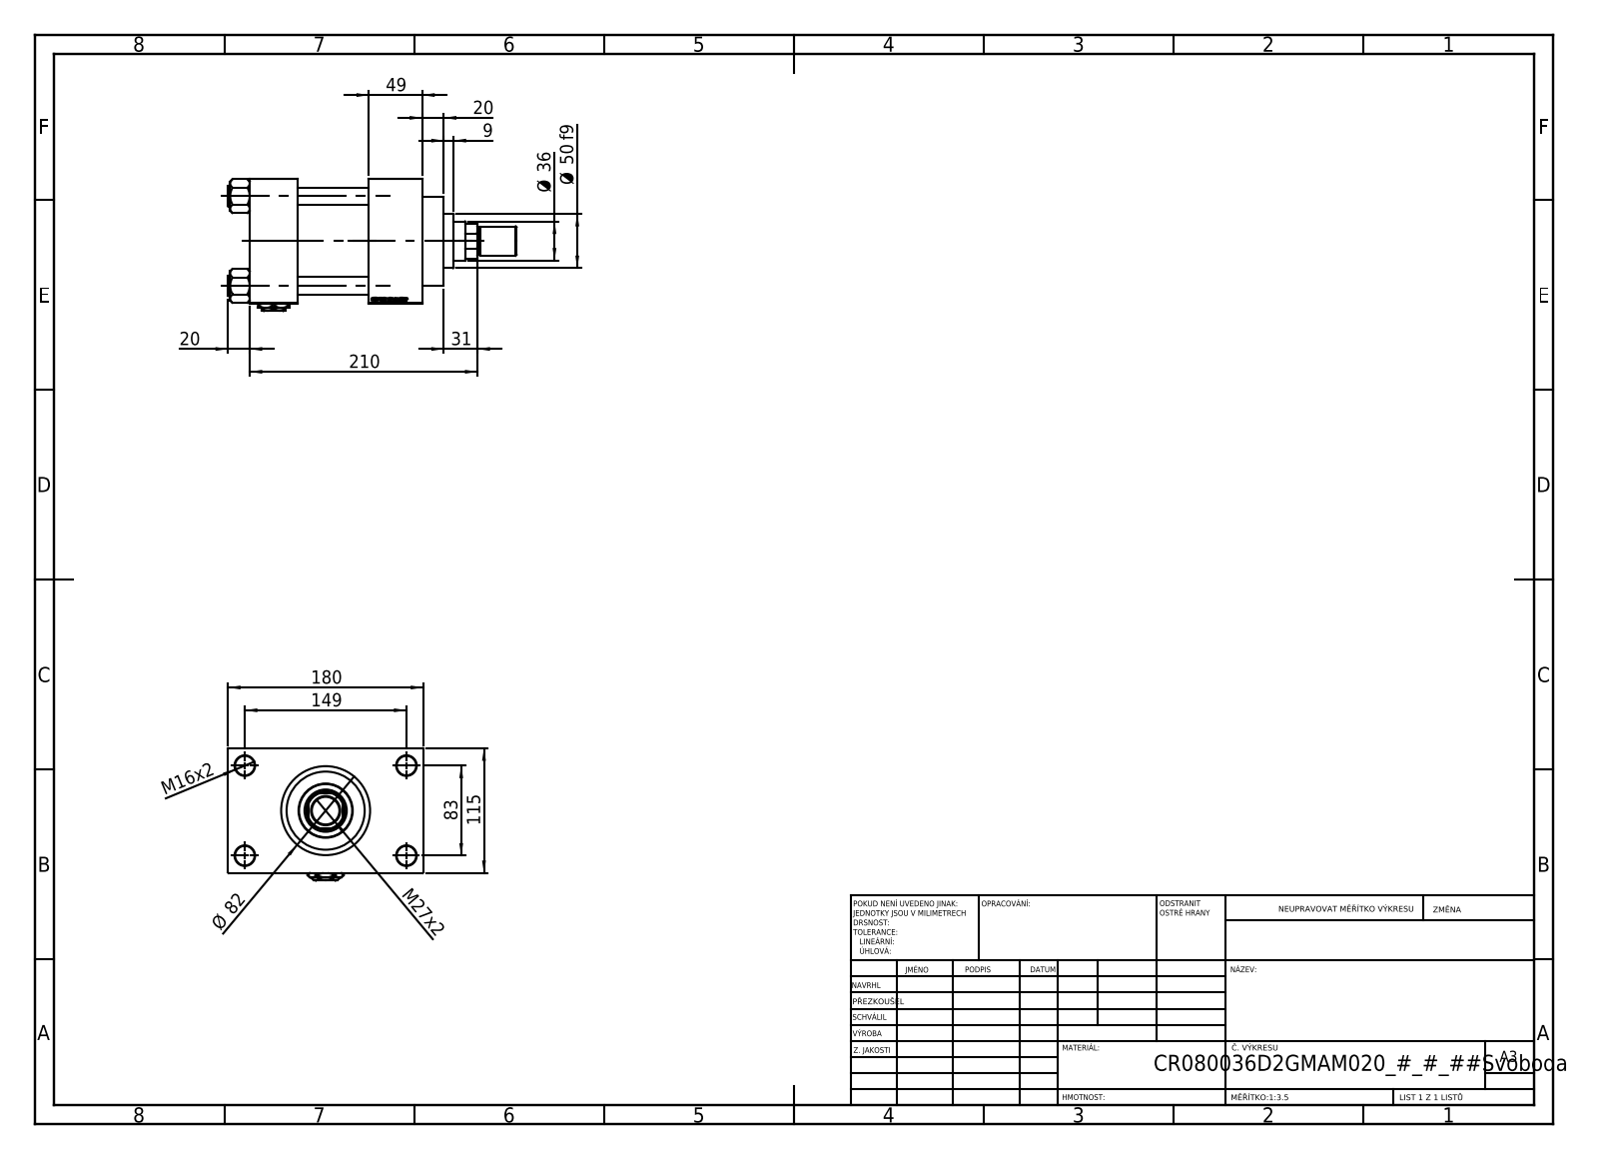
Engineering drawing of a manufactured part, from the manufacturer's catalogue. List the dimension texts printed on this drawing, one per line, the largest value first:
210
180
149
115
83
Ø 82
Ø 50 f9
49
Ø 36
31
M27x2
20
20
M16x2
9
